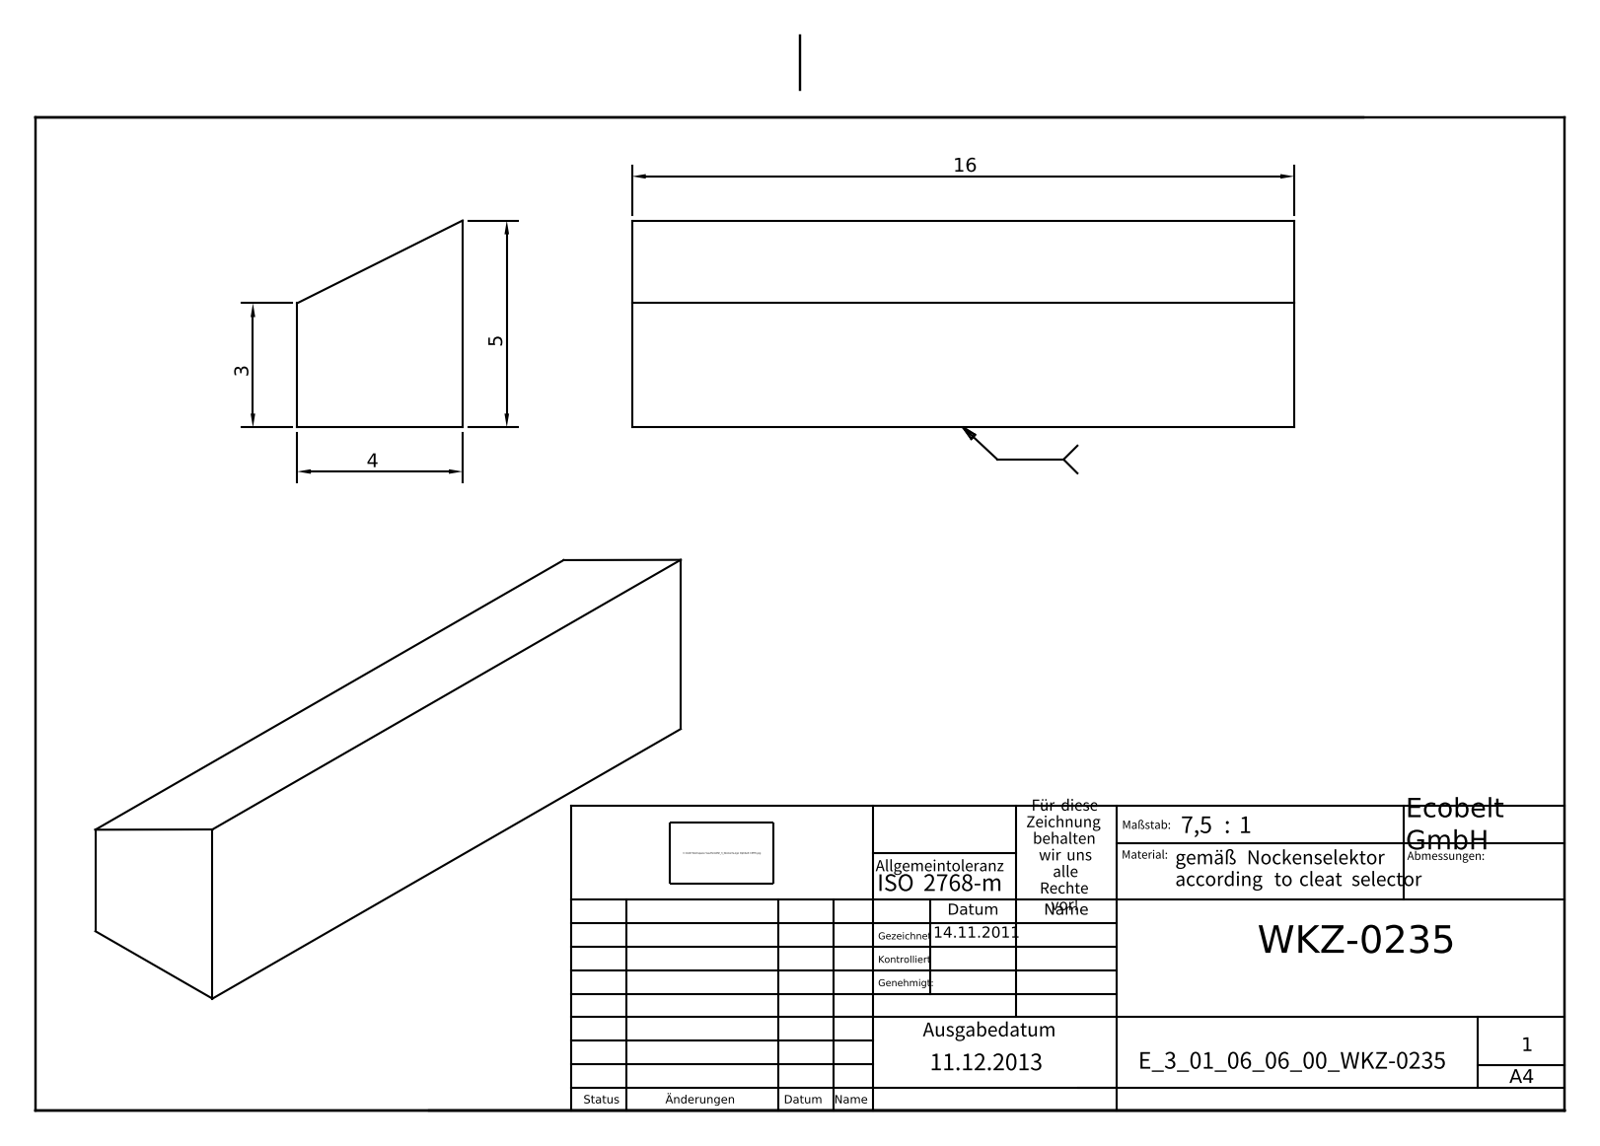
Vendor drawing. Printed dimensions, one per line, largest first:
16
5
4
3
